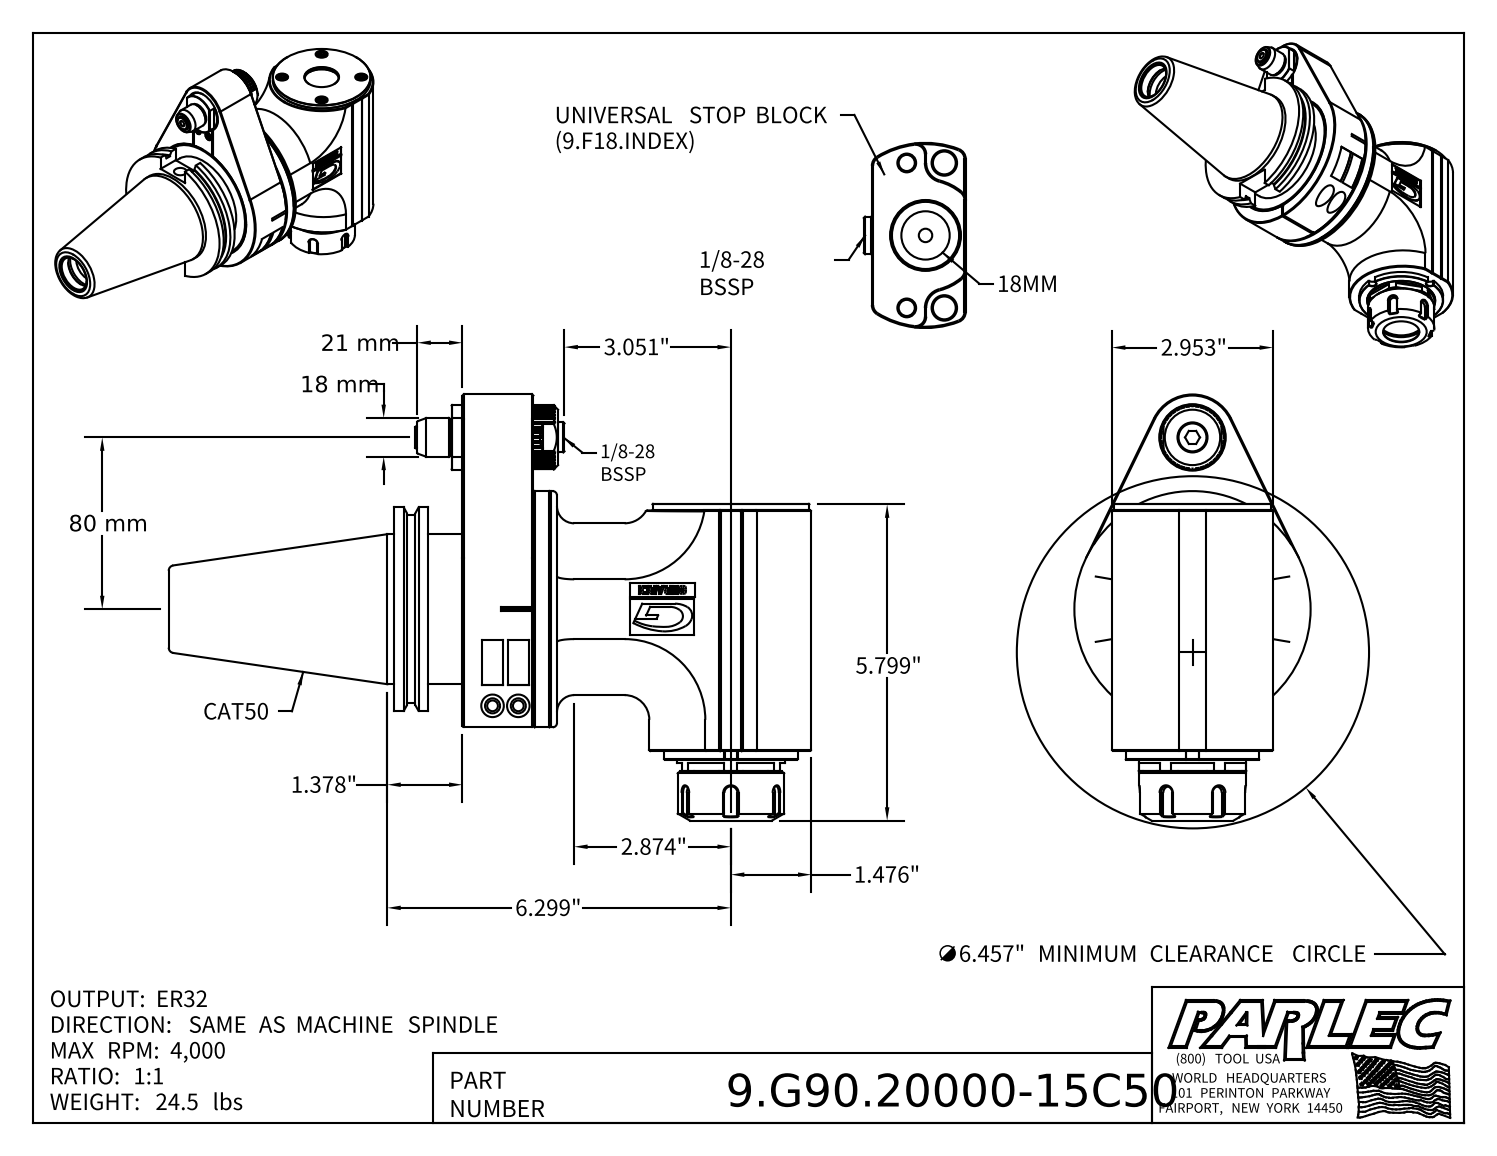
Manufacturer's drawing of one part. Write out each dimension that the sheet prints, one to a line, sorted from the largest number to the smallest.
80 mm
21 mm
18 mm
∅6.457" MINIMUM CLEARANCE CIRCLE
6.299"
5.799"
3.051"
2.953"
2.874"
1.476"
1.378"
